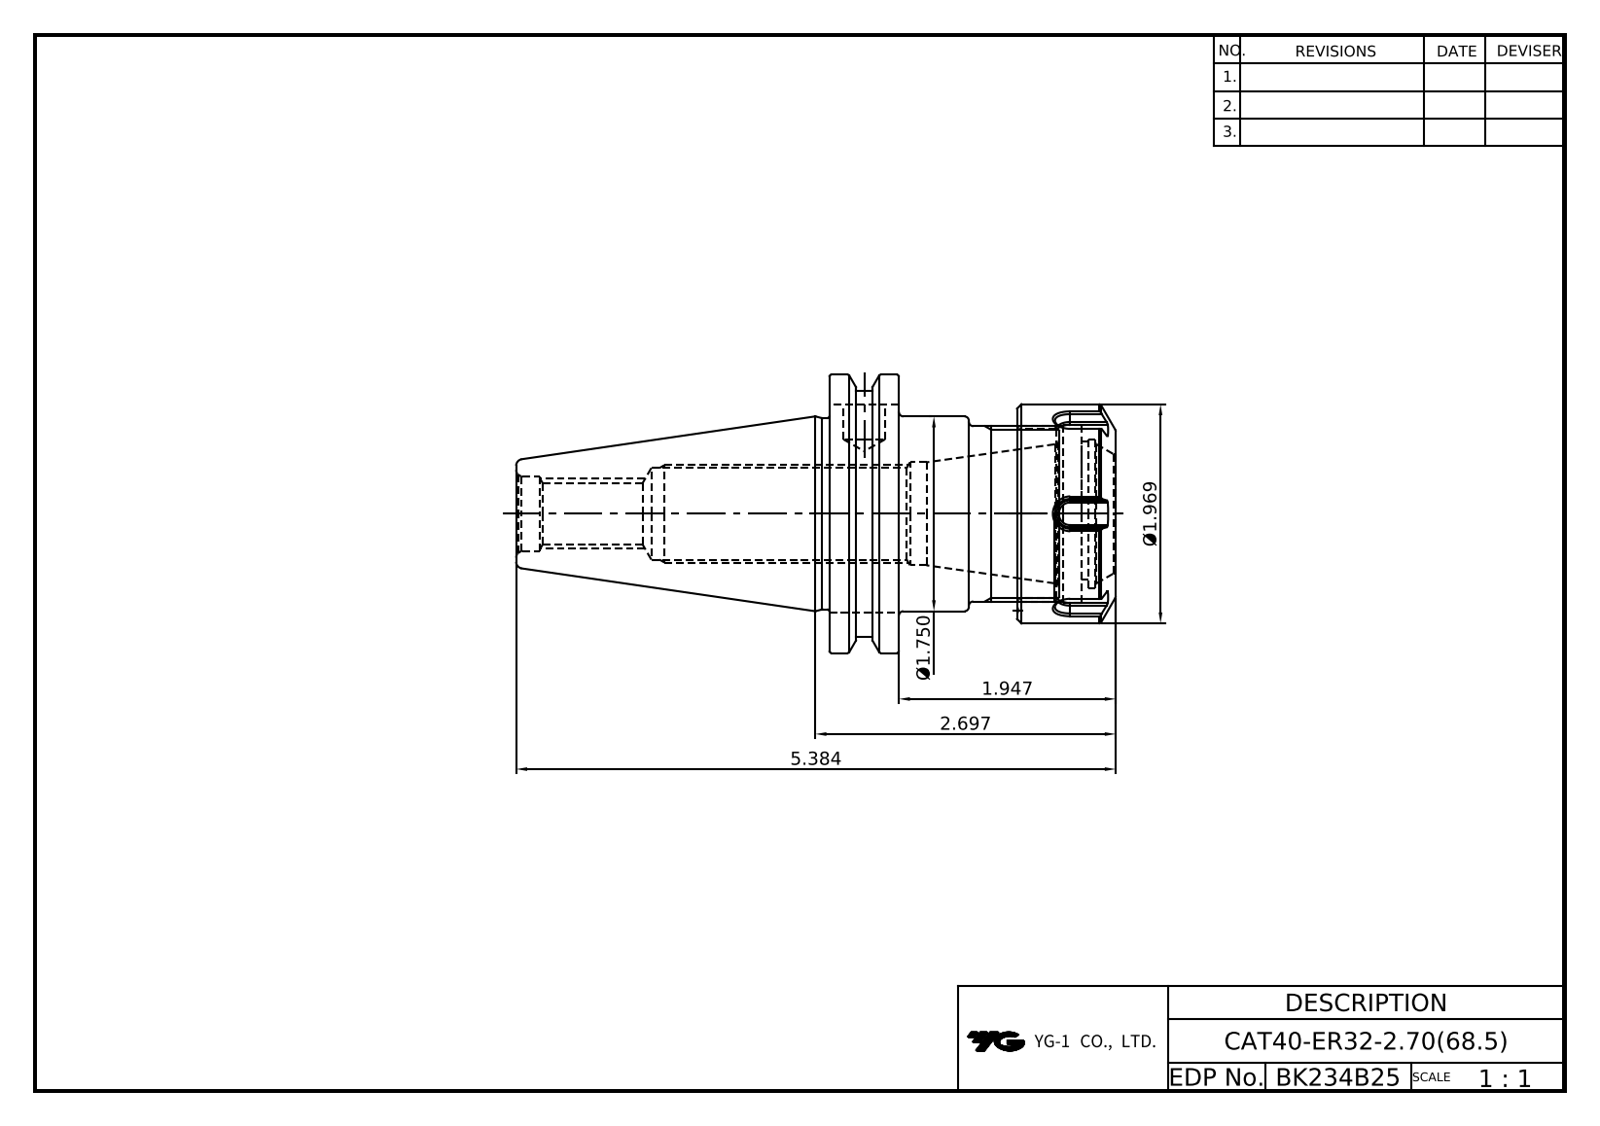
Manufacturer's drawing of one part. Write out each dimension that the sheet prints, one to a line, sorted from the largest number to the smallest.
5.384
2.697
Ø1.969
1.947
Ø1.750
